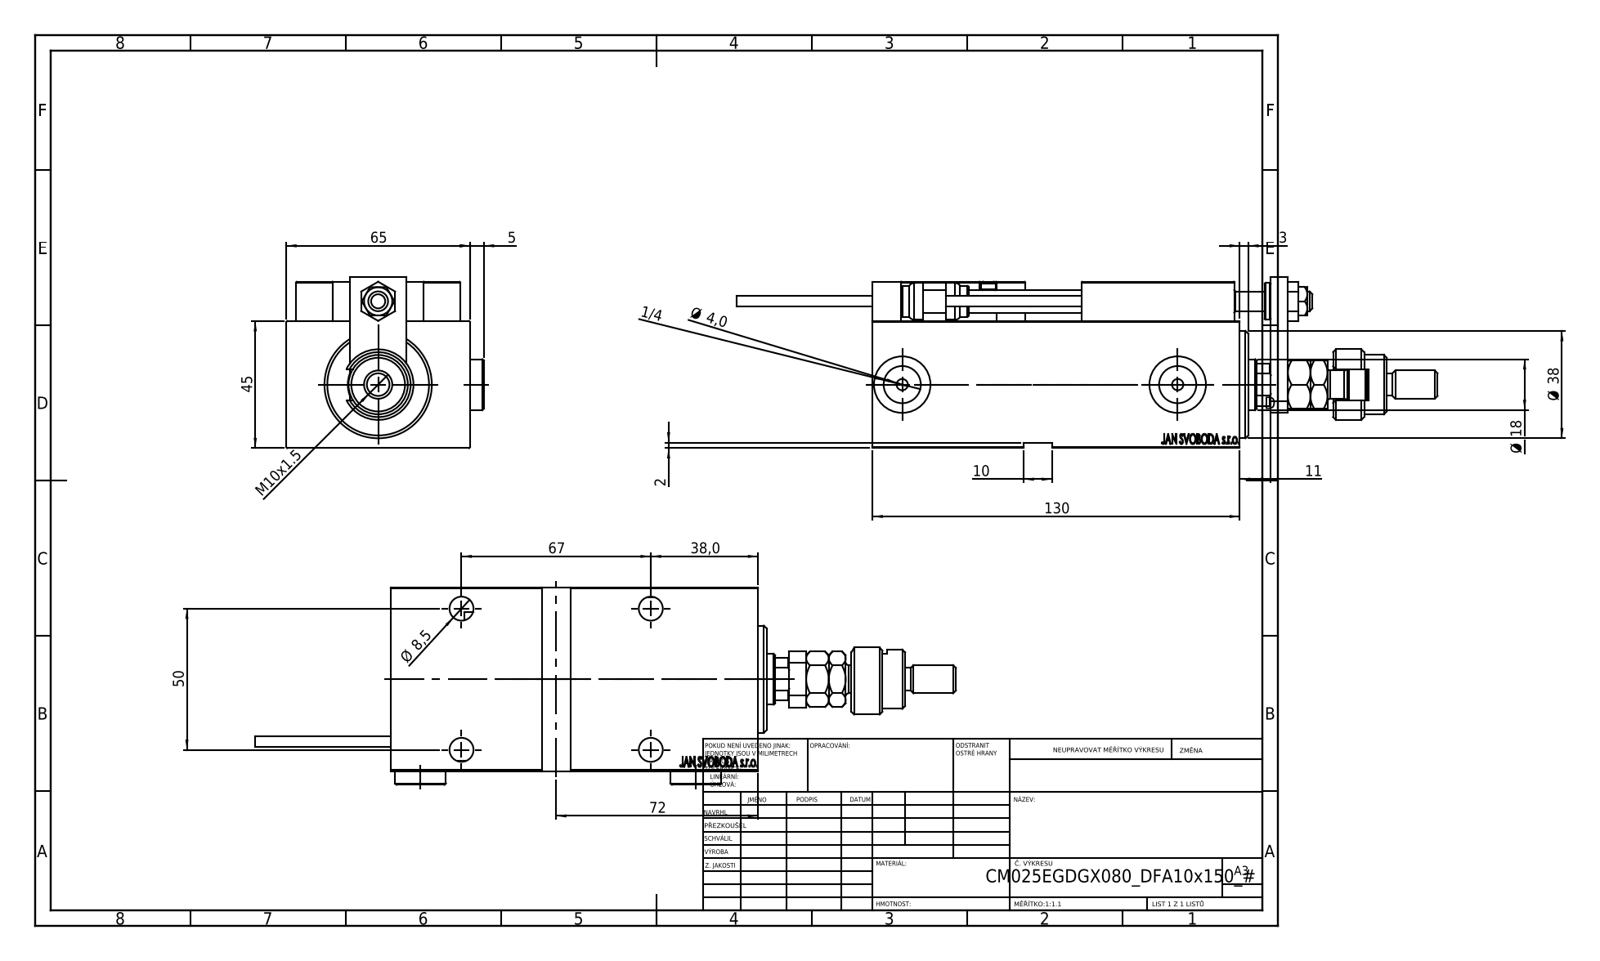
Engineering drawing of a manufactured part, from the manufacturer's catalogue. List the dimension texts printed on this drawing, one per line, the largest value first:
130
72
67
65
50
45
Ø 38
38,0
Ø 18
11
M10x1.5
10
Ø 8,5
5
Ø 4,0
3
2
1/4
